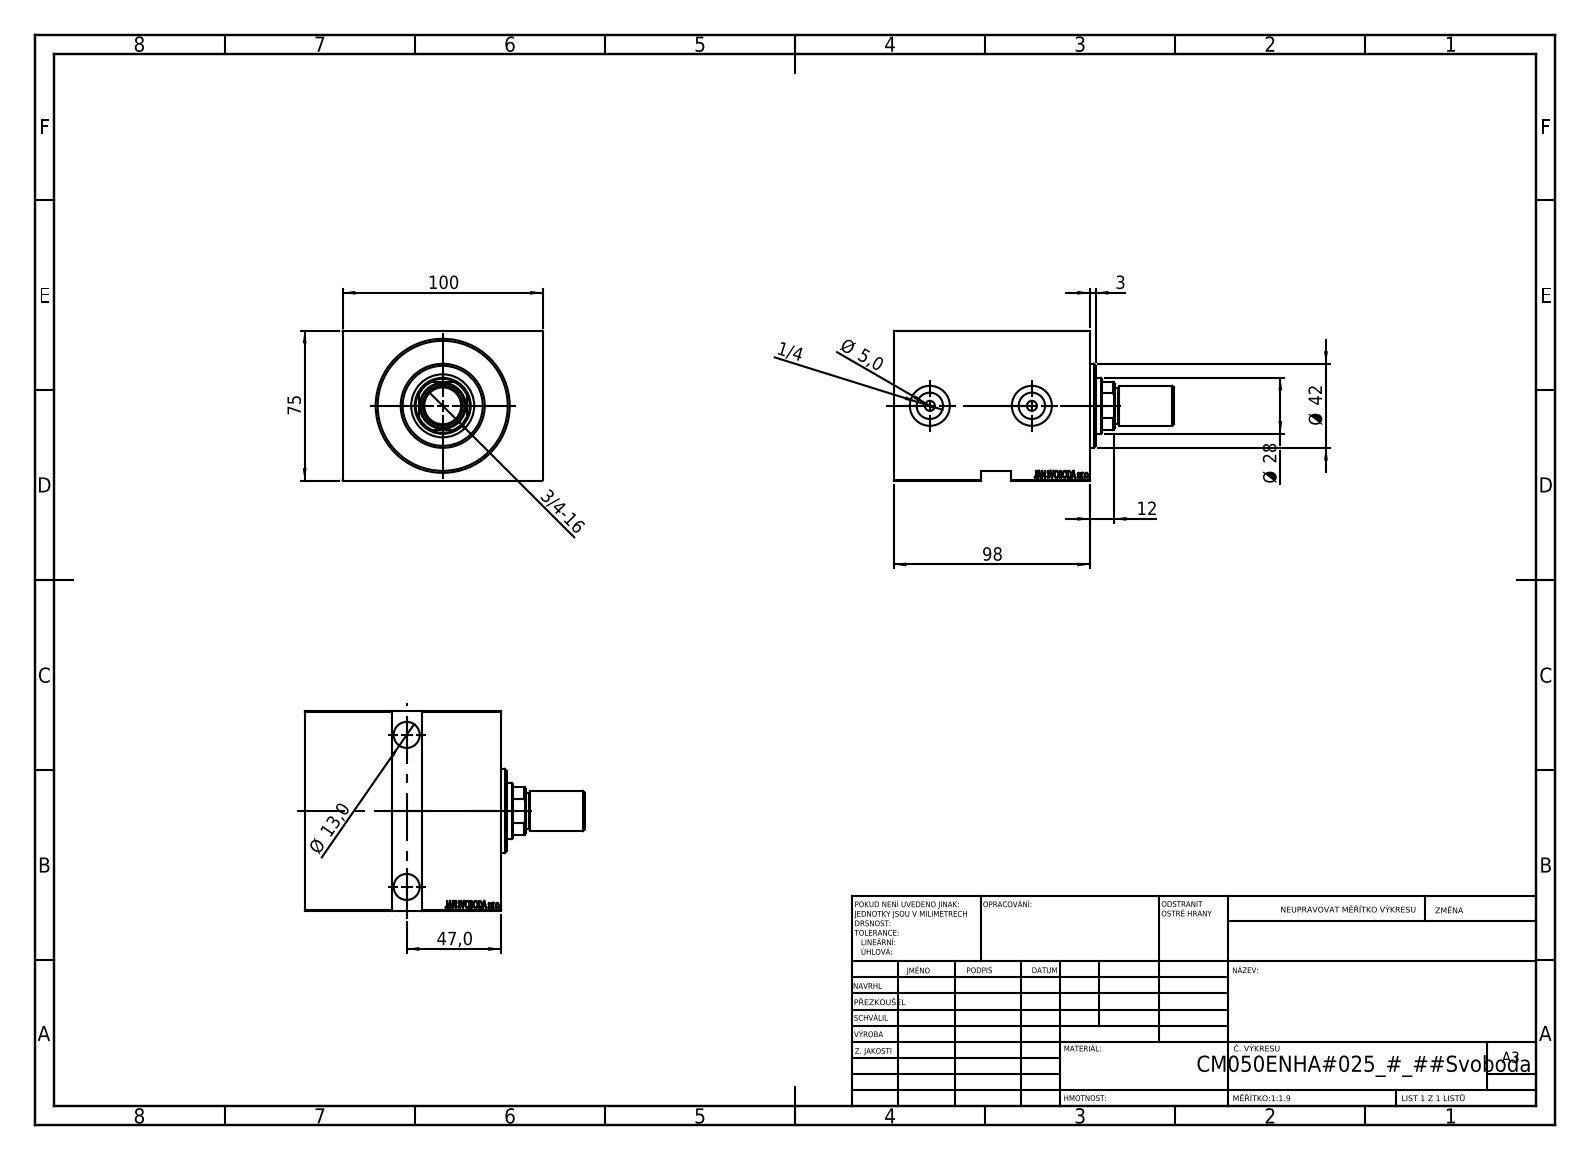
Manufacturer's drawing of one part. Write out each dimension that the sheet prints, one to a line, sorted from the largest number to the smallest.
100
98
75
47,0
Ø 42
Ø 28
Ø 13,0
12
Ø 5,0
3
3/4-16
1/4
